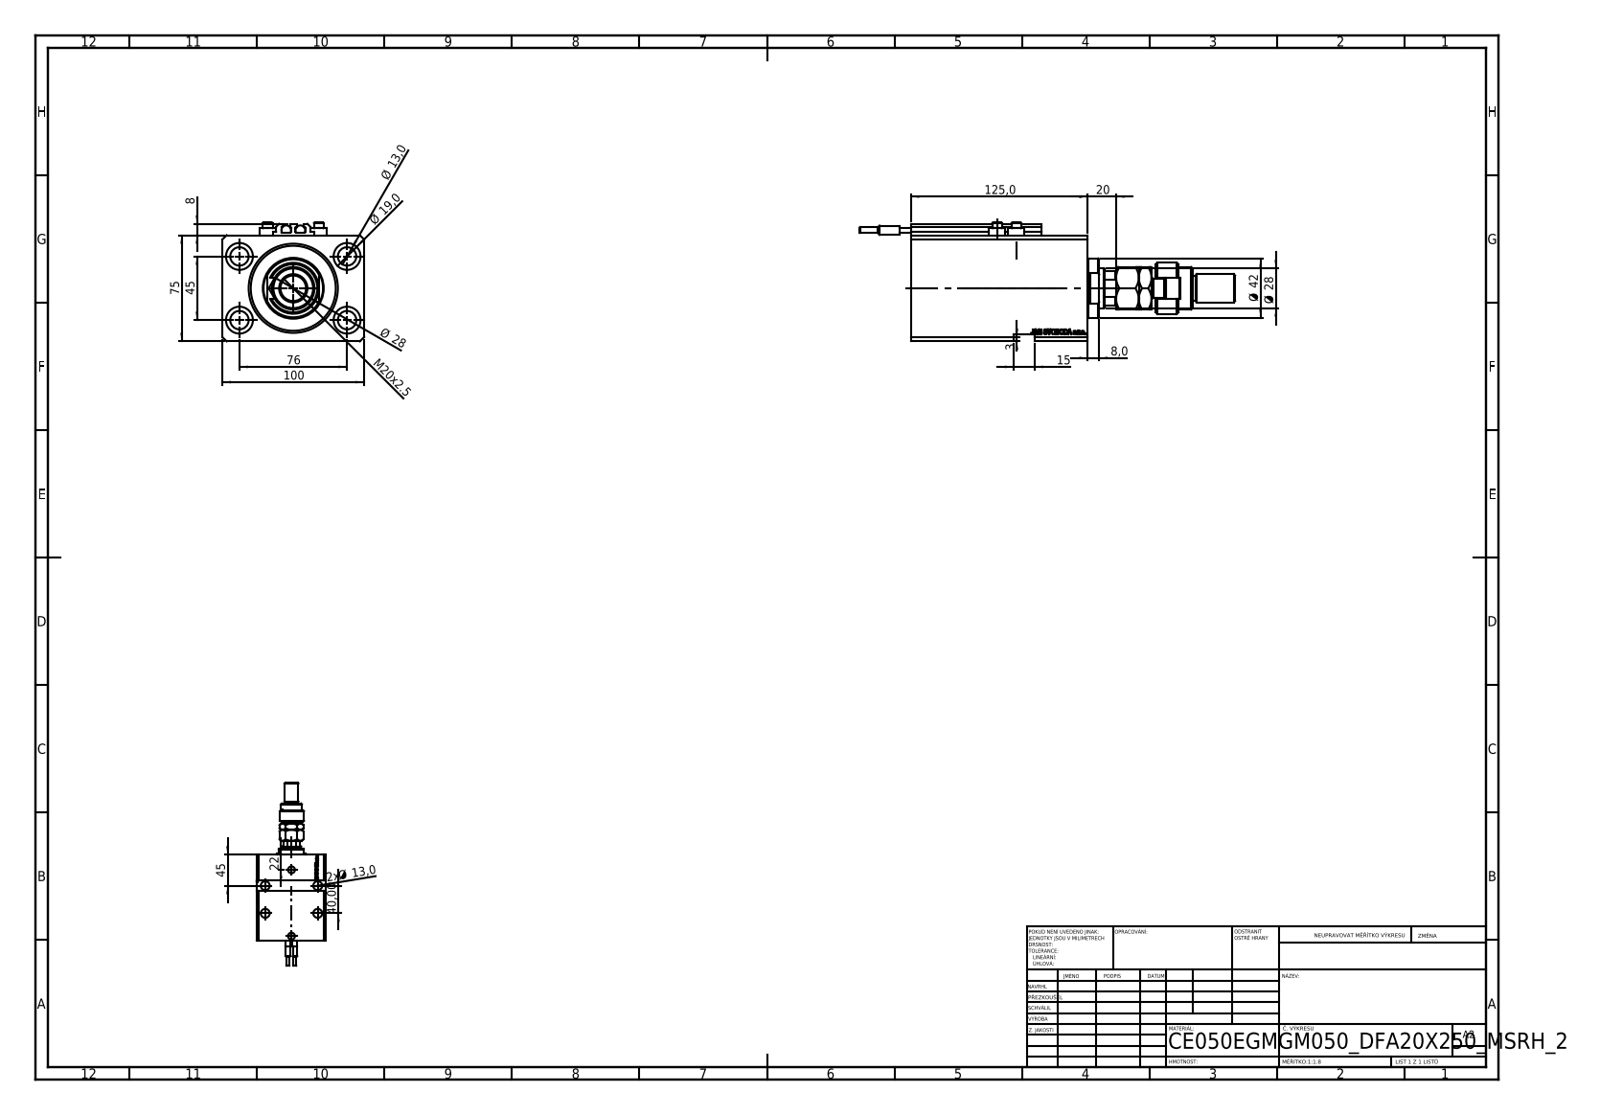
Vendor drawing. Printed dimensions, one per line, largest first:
125,0
100
76
75
45
45
Ø 42
40,00
Ø 28
Ø 28
22
M20x2.5
20
Ø 19,0
15
Ø 13,0
2x Ø 13,0
8
8,0
3
